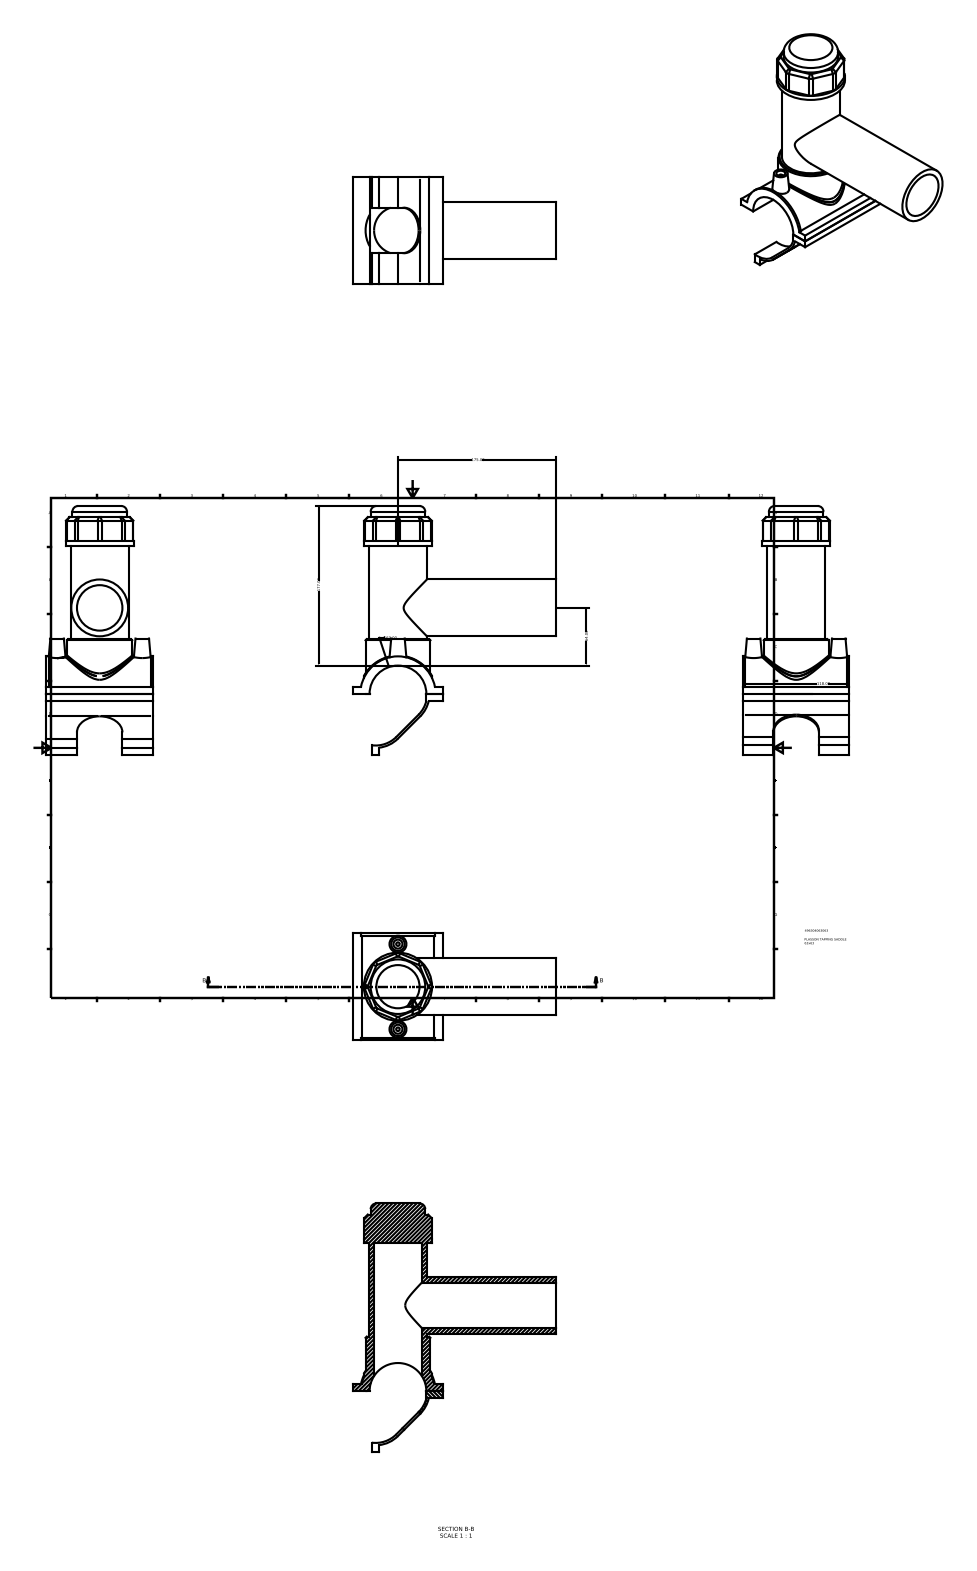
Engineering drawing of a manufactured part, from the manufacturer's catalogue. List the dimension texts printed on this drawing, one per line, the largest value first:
177.00
175.00
118.00
64.00
∅63.00
